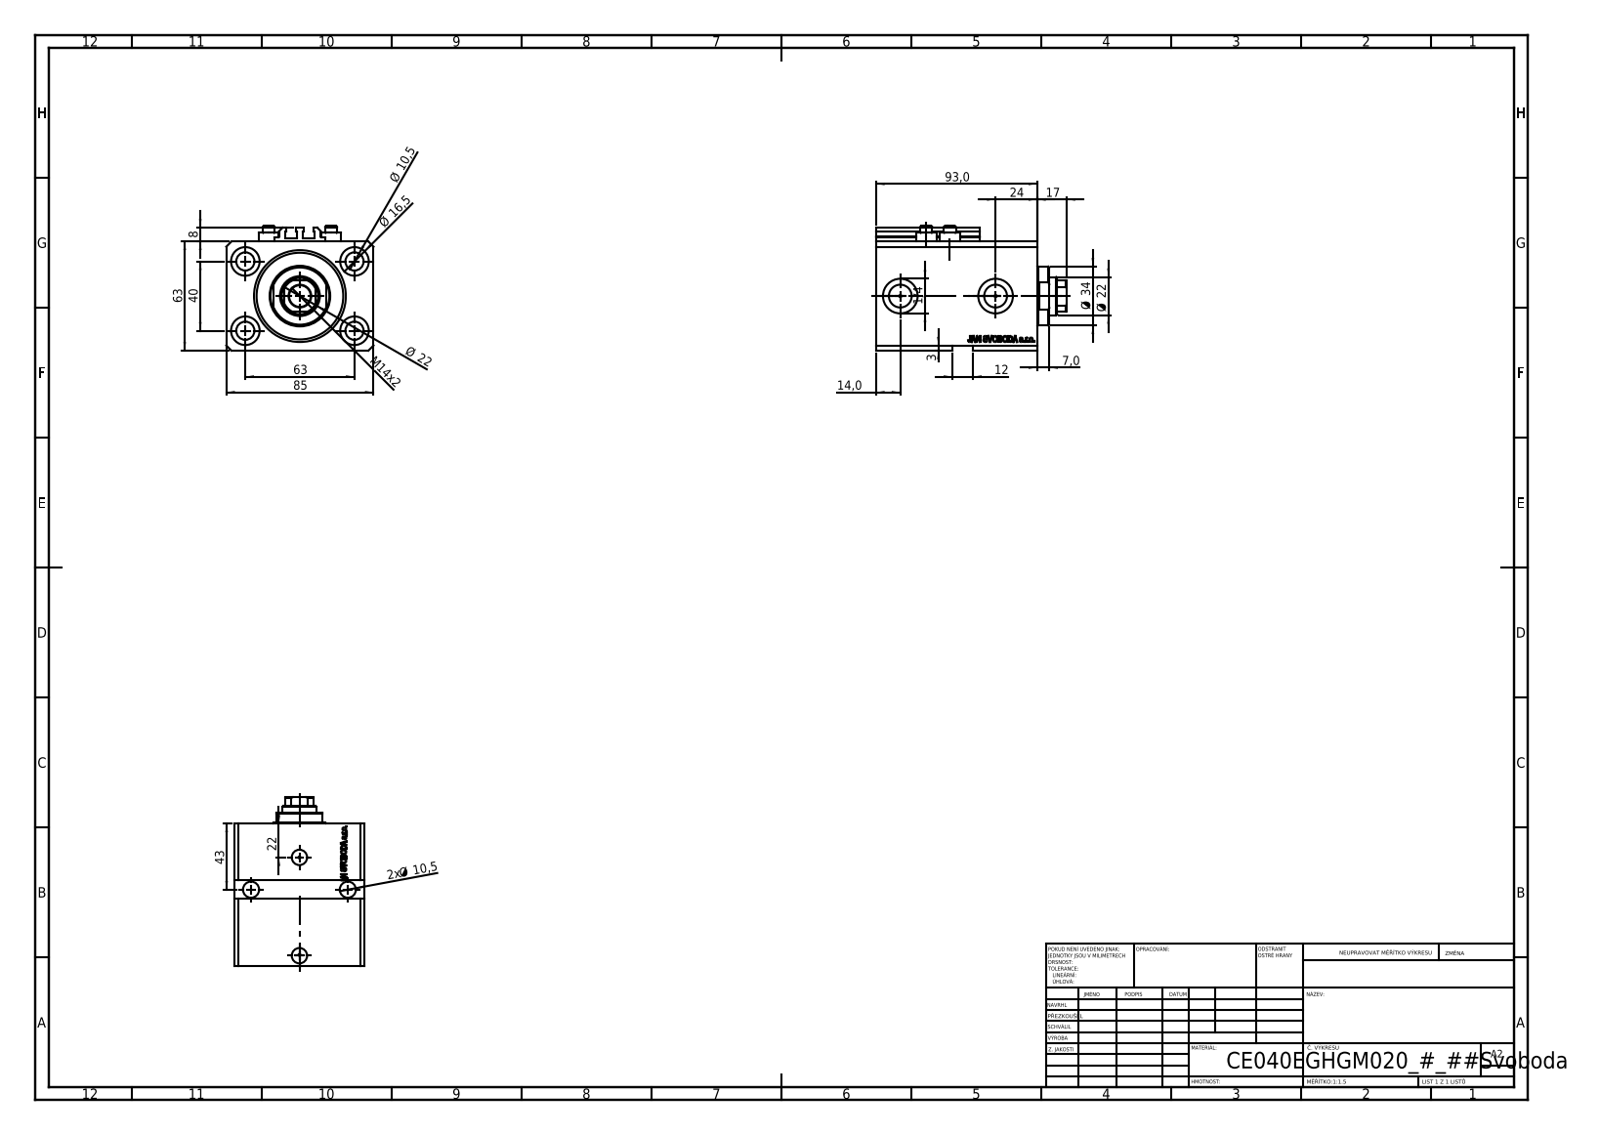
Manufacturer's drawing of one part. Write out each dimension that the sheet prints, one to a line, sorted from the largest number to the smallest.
93,0
85
63
63
43
40
Ø 34
24
Ø 22
Ø 22
22
17
Ø 16,5
M14x2
14,0
12
Ø 10,5
2x Ø 10,5
8
7,0
3
1/4
